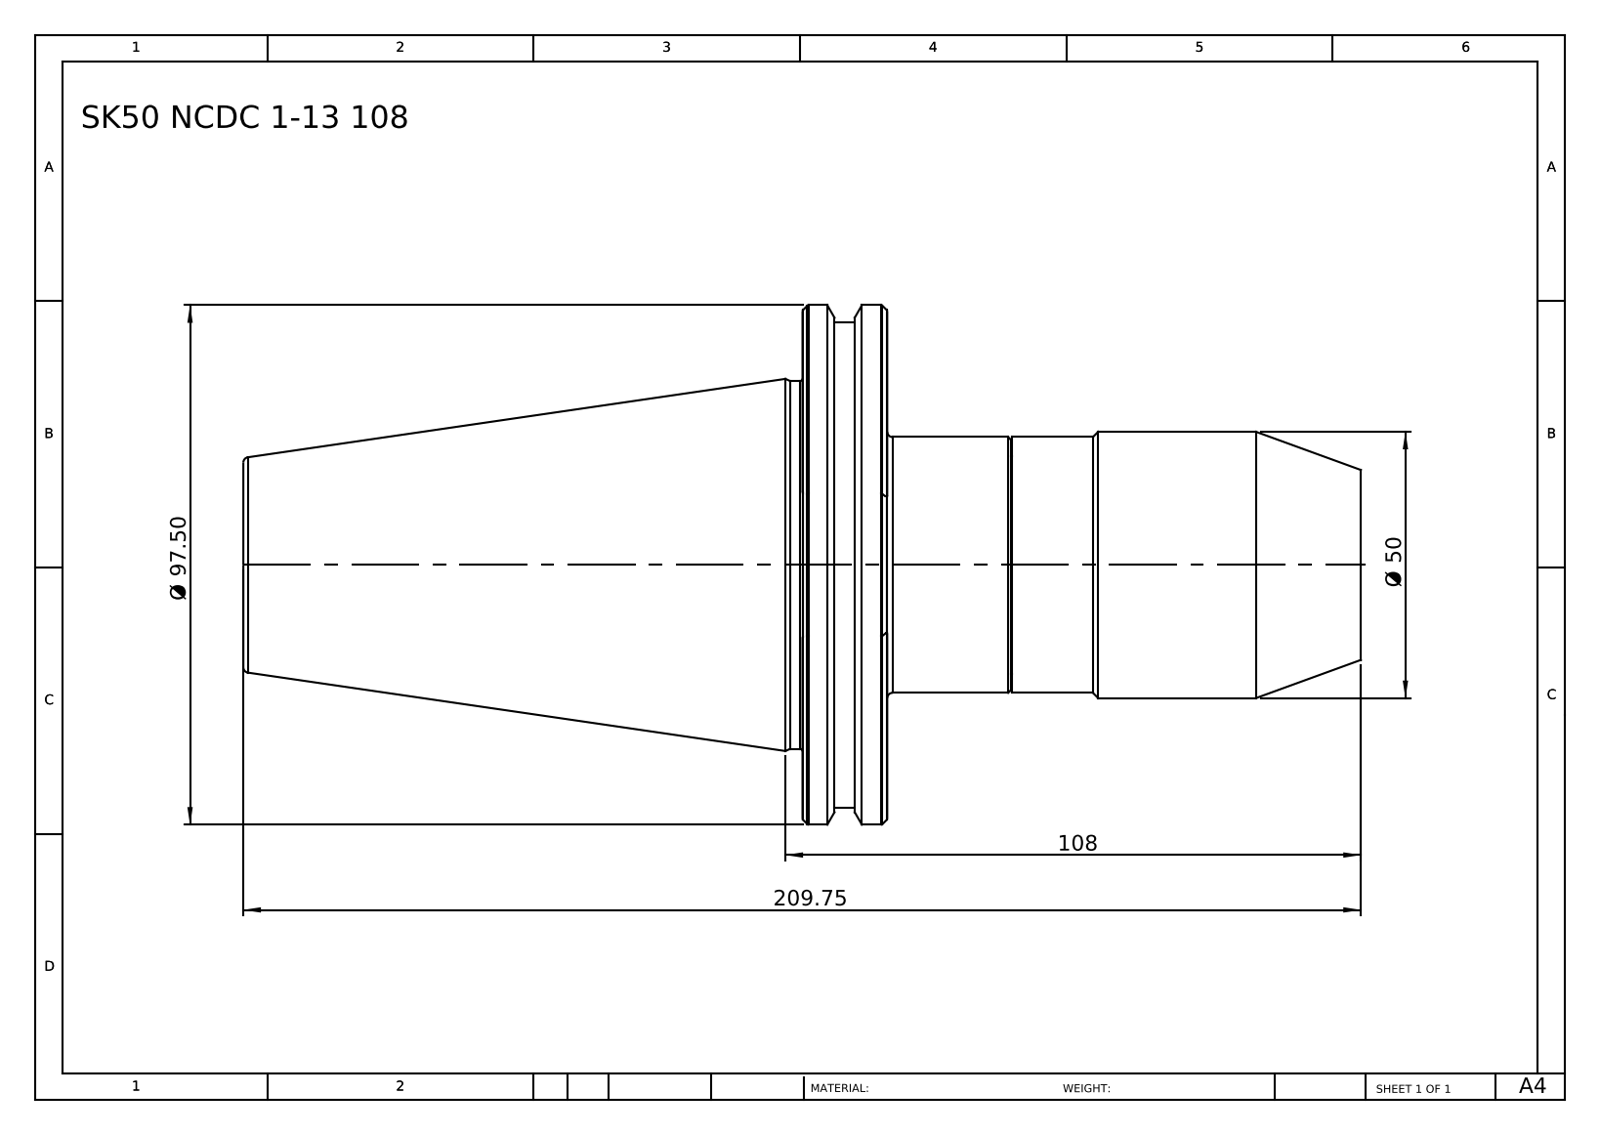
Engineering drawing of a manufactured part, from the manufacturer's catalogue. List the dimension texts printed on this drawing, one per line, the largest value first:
209.75
108
Ø 97.50
Ø 50
